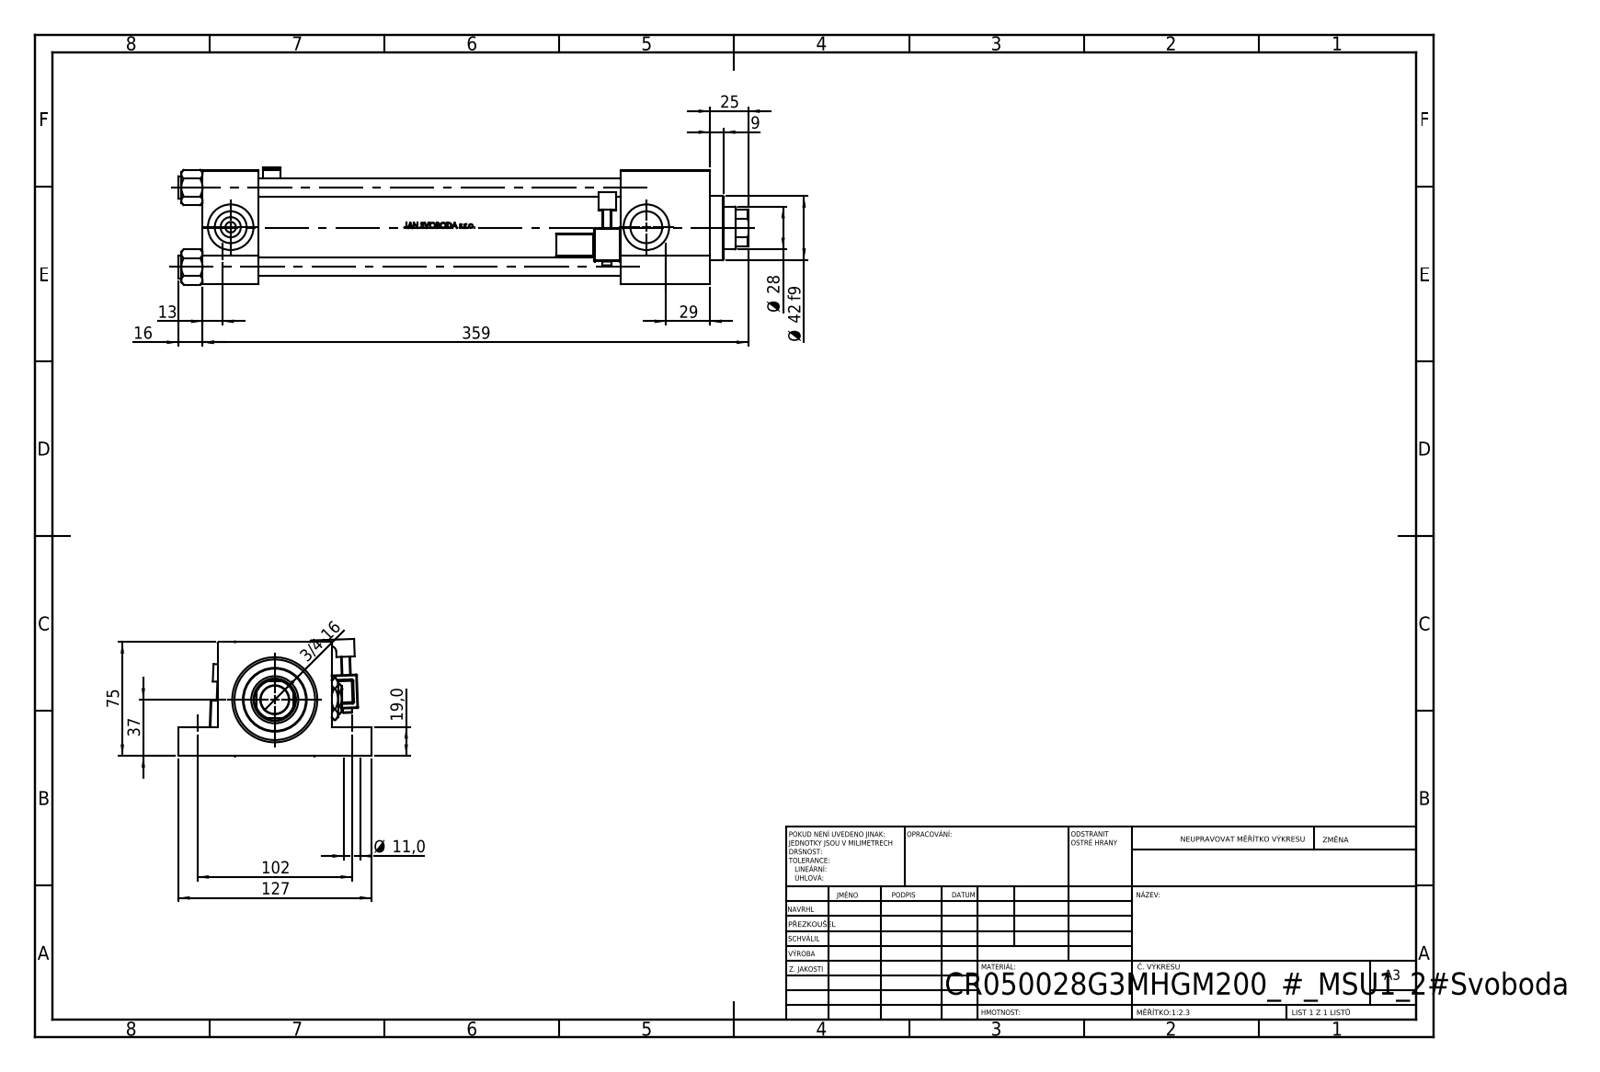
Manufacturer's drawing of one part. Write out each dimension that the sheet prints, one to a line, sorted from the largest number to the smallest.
359
127
102
75
Ø 42 f9
37
29
Ø 28
25
19,0
16
13
Ø 11,0
9
3/4-16
